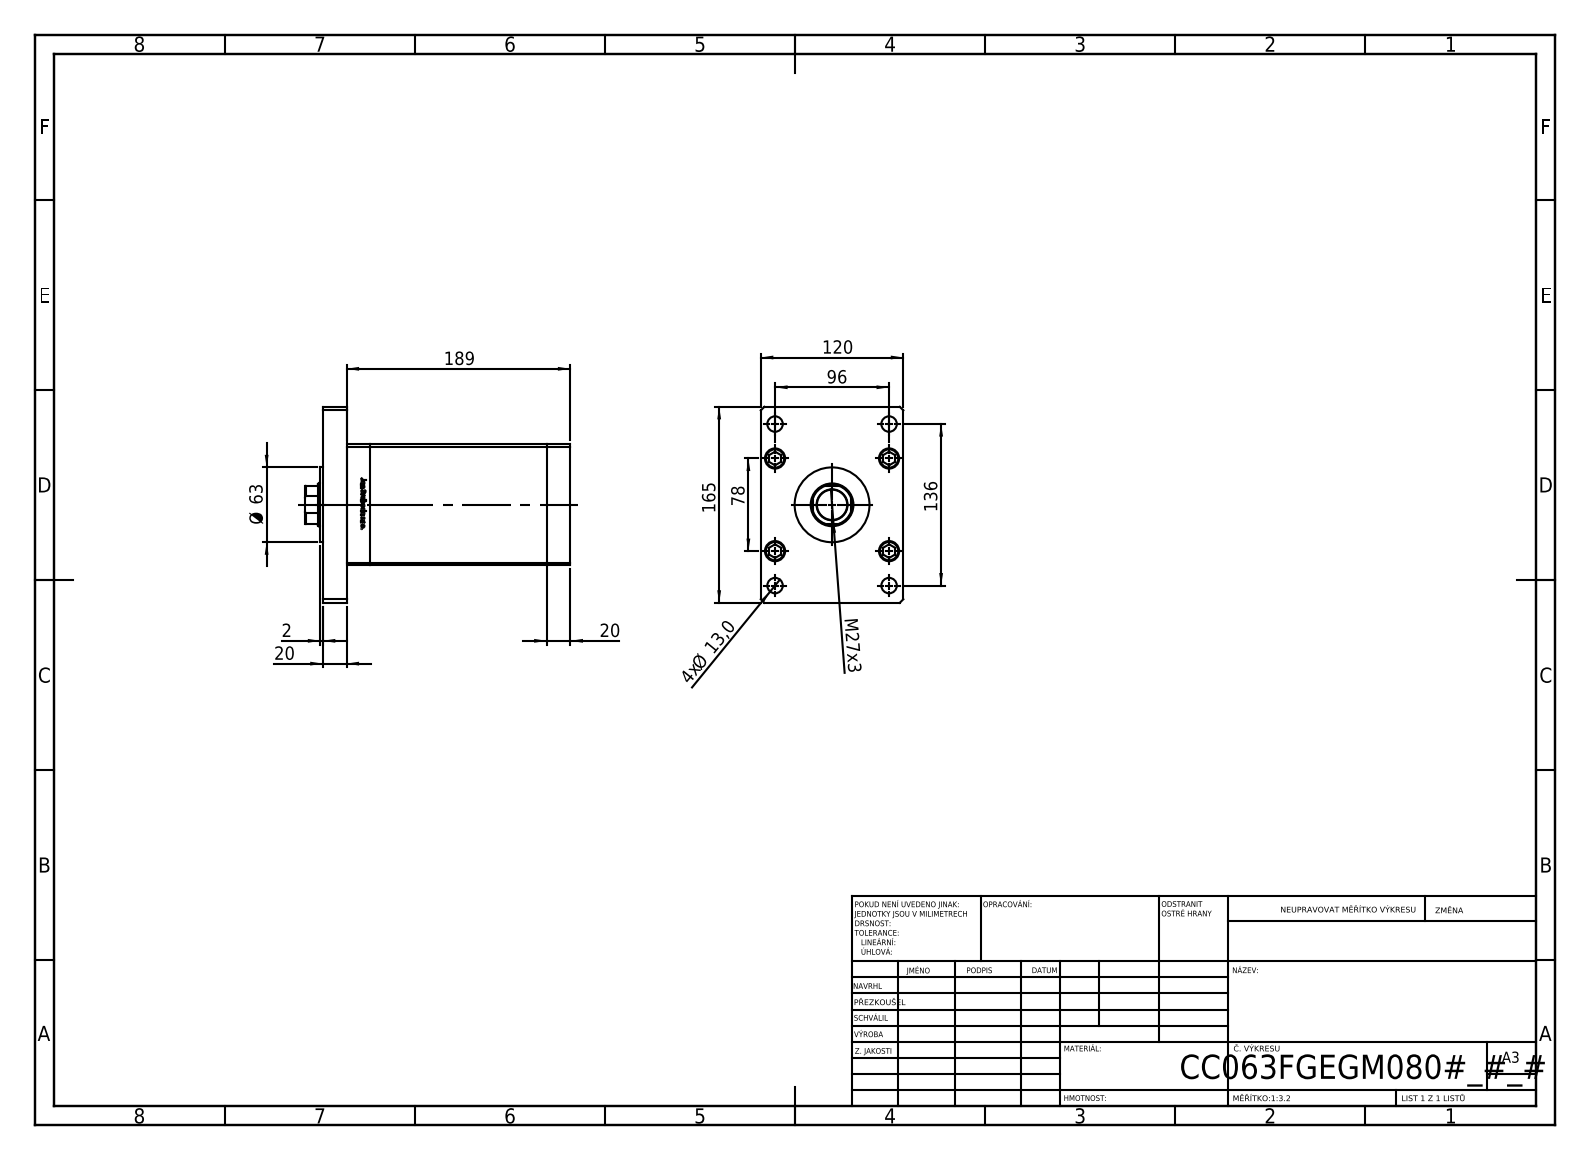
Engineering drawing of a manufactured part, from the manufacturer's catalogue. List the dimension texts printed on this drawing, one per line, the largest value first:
189
165
136
120
96
78
Ø 63
M27x3
20
20
4x Ø 13,0
2
